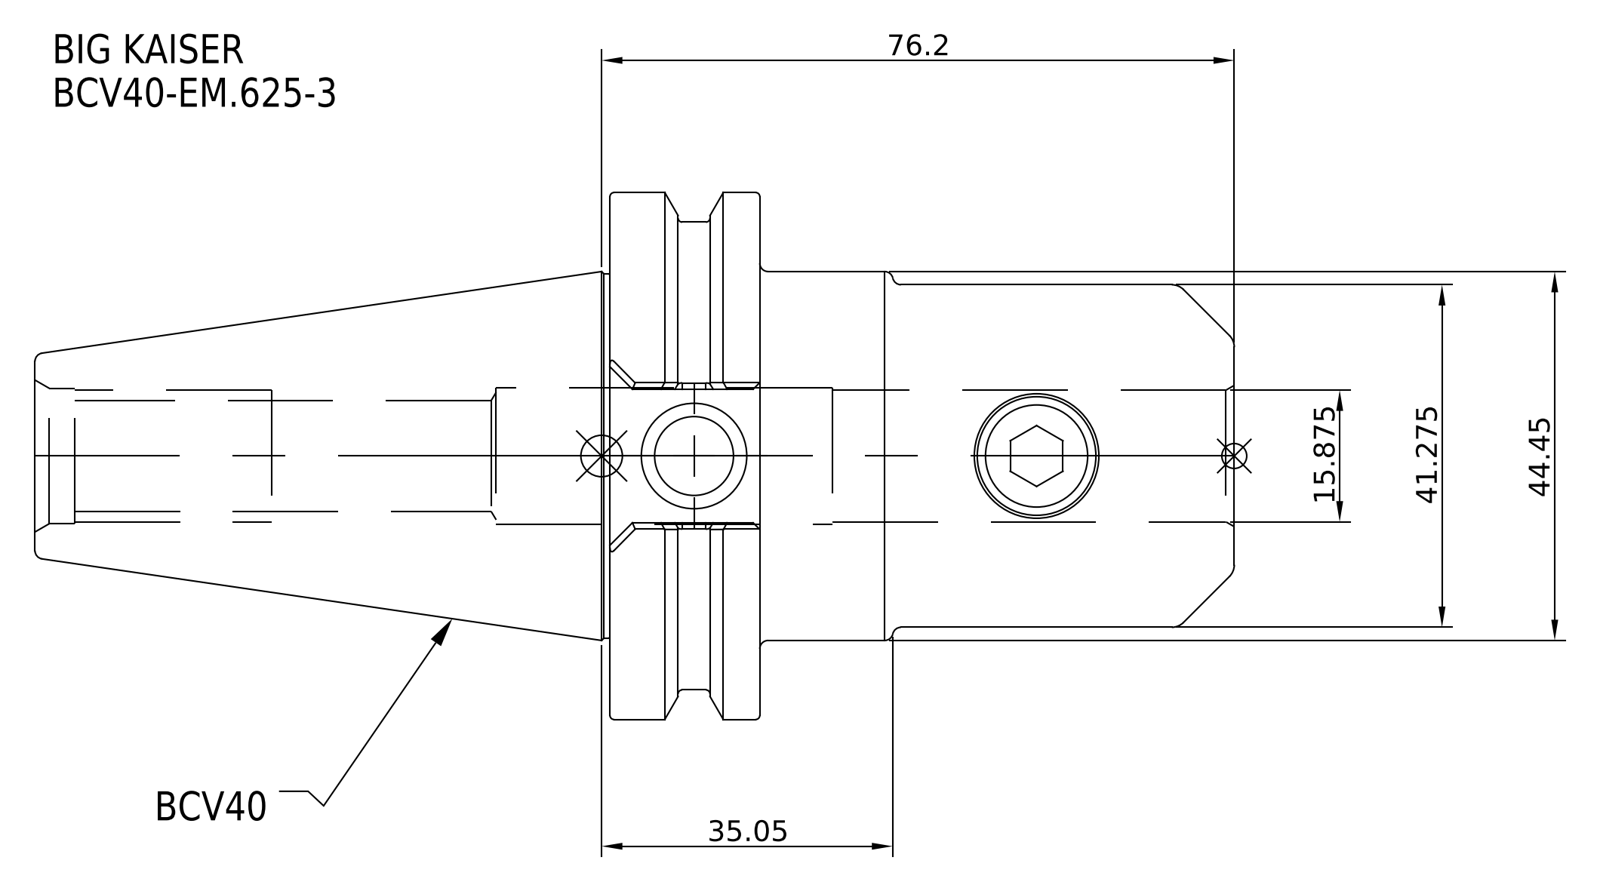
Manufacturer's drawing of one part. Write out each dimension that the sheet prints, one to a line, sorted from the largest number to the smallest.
76.2
44.45
41.275
35.05
15.875
